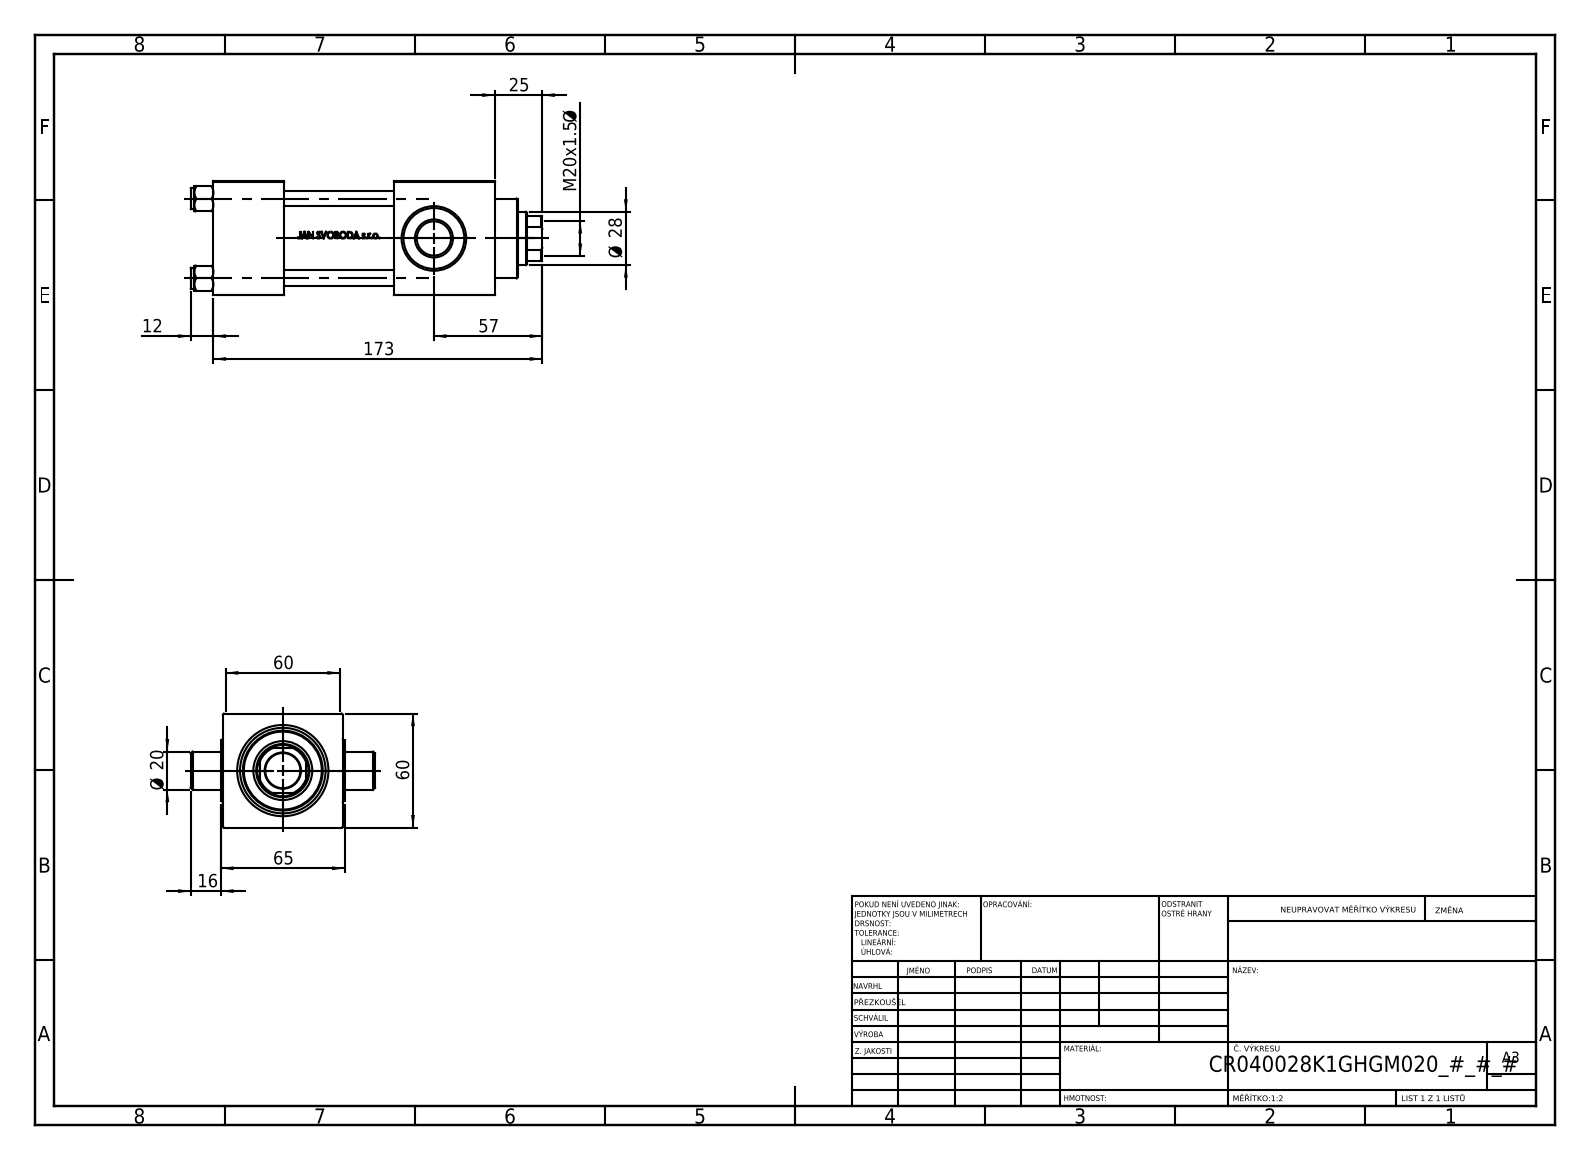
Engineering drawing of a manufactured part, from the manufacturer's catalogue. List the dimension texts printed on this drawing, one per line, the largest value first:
173
65
60
60
57
Ø 28
25
M20x1.5 Ø
Ø 20
16
12
